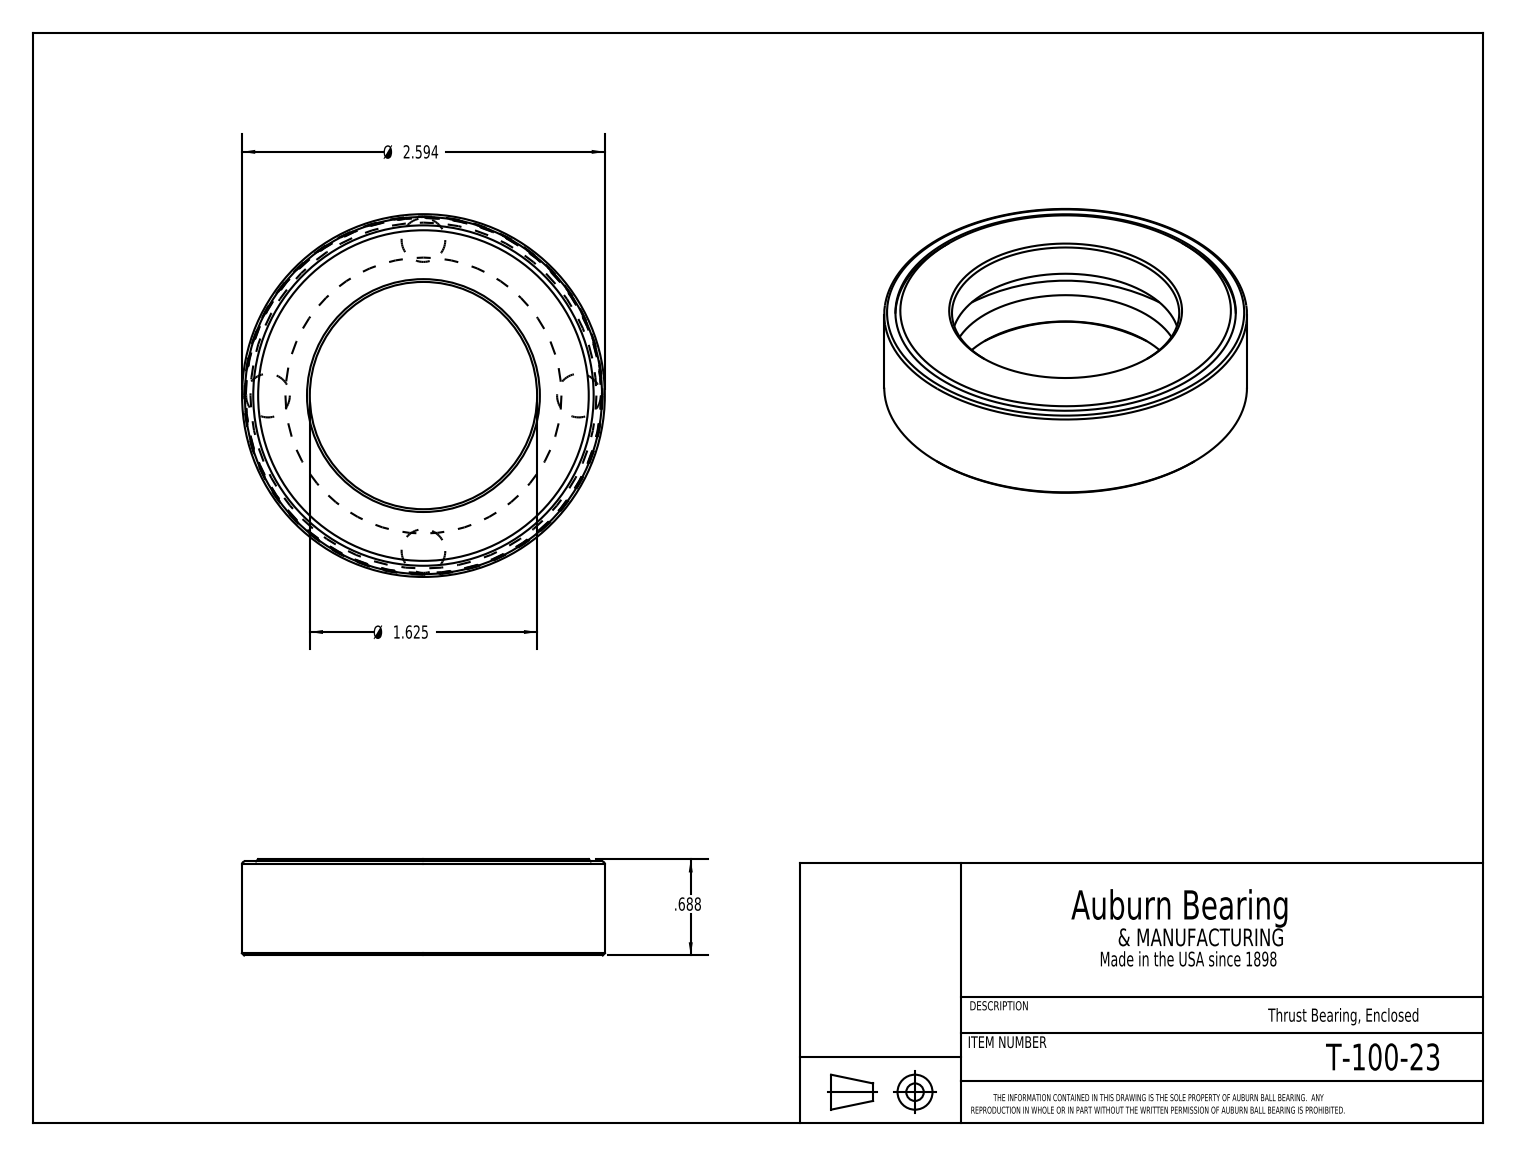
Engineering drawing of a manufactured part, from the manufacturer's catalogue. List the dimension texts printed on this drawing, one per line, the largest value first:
Ø 2.594
Ø 1.625
.688
